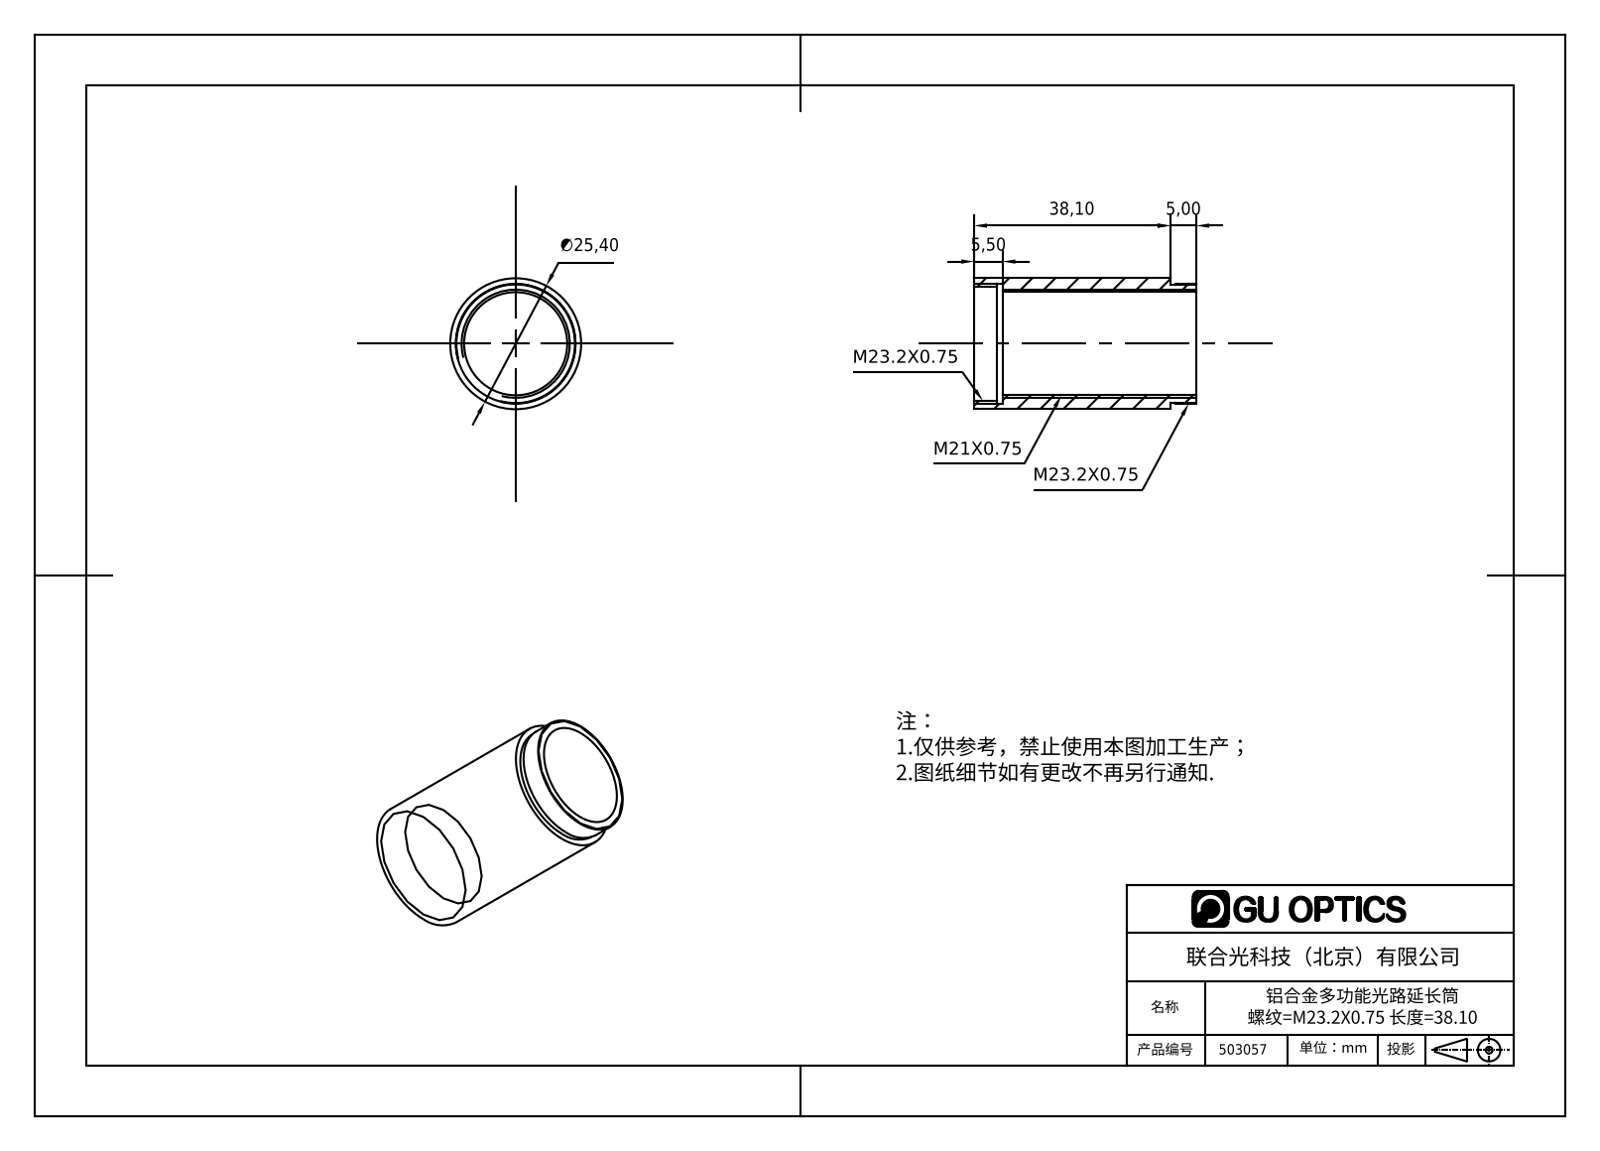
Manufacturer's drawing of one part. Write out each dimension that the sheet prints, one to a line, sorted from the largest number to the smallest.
38,10
∅25,40
5,50
5,00
